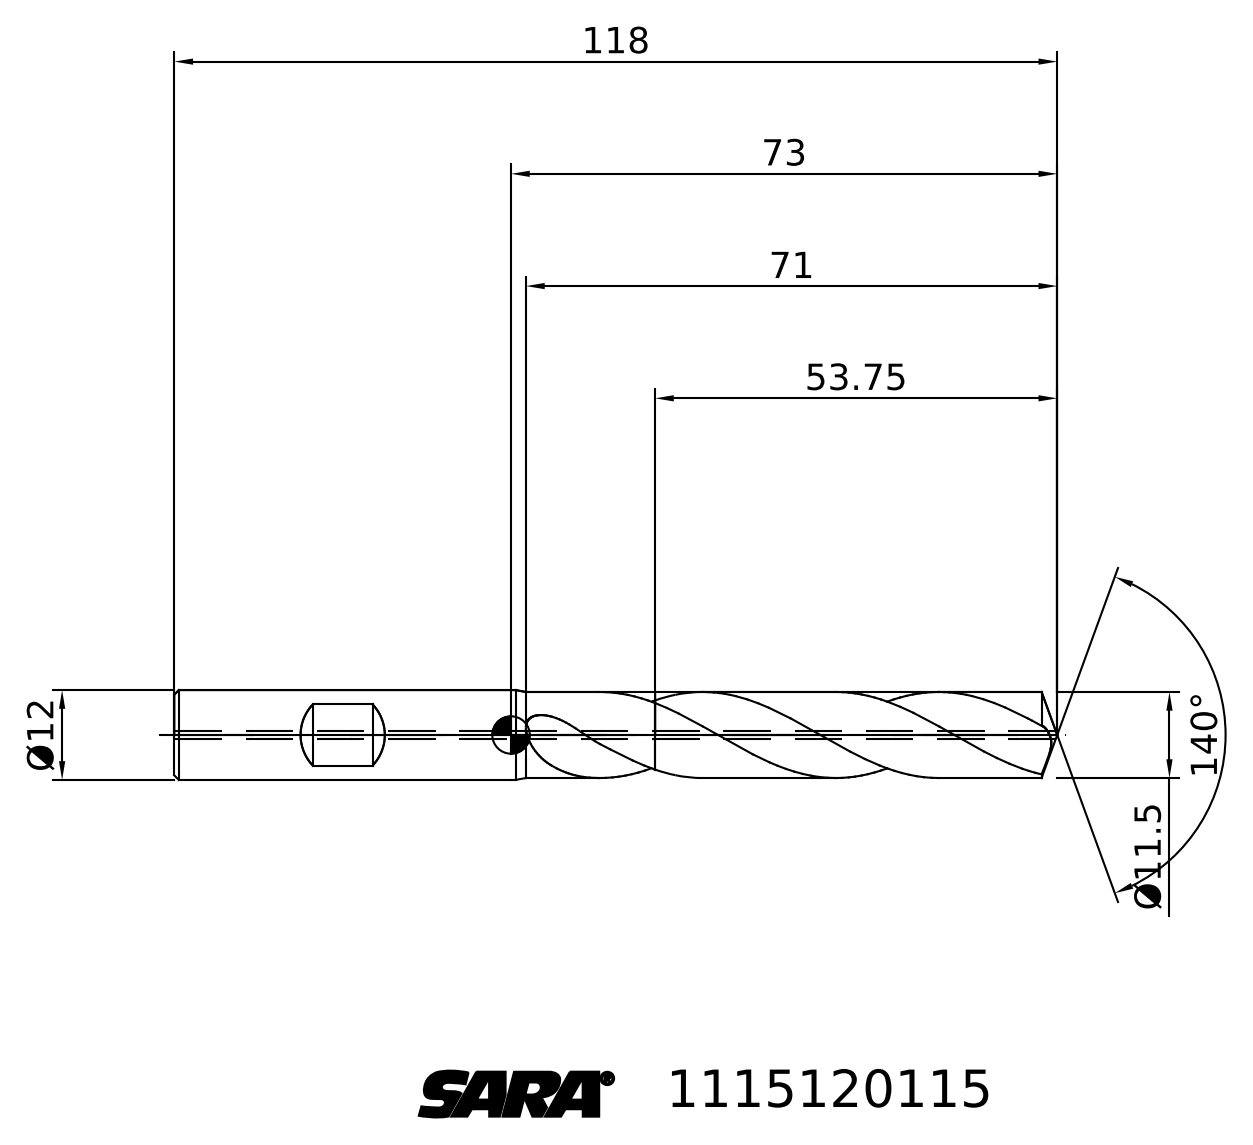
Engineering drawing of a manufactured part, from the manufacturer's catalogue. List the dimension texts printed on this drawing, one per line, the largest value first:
140°
118
73
71
53.75
Ø12
Ø11.5
